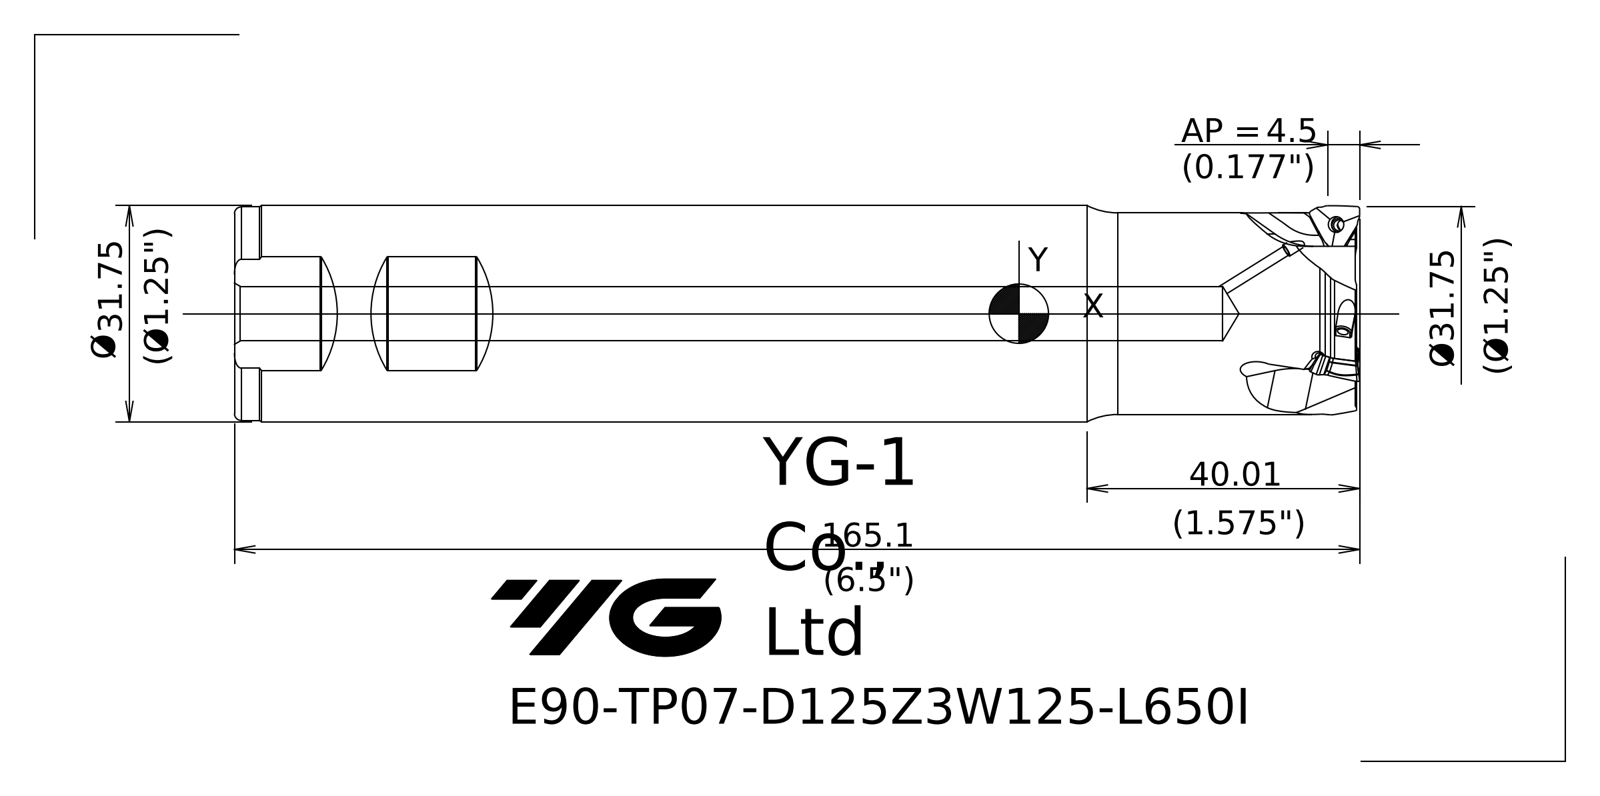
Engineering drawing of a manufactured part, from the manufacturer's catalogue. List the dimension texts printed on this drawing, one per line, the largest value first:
165.1
40.01
Ø31.75
4.5 AP =
